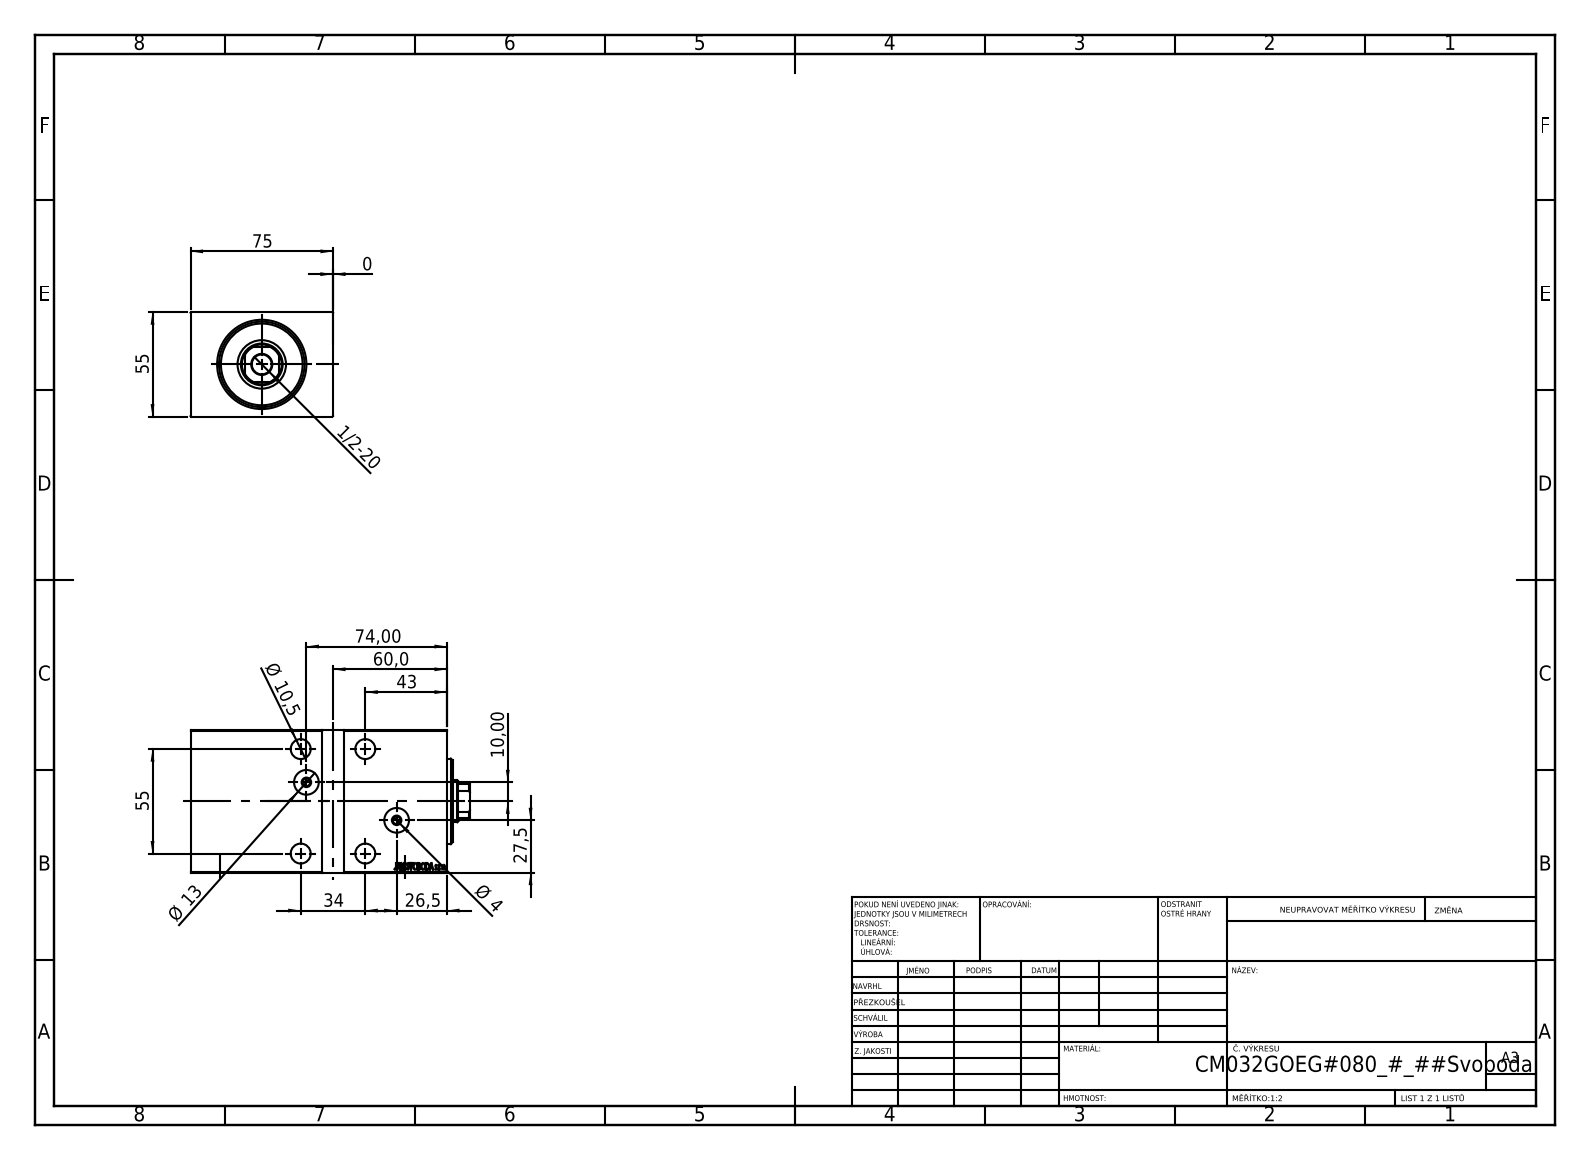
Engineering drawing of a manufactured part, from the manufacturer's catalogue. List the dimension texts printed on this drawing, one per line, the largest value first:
75
74,00
60,0
55
55
43
34
27,5
26,5
Ø 13
Ø 10,5
10,00
Ø 4
1/2-20
0
